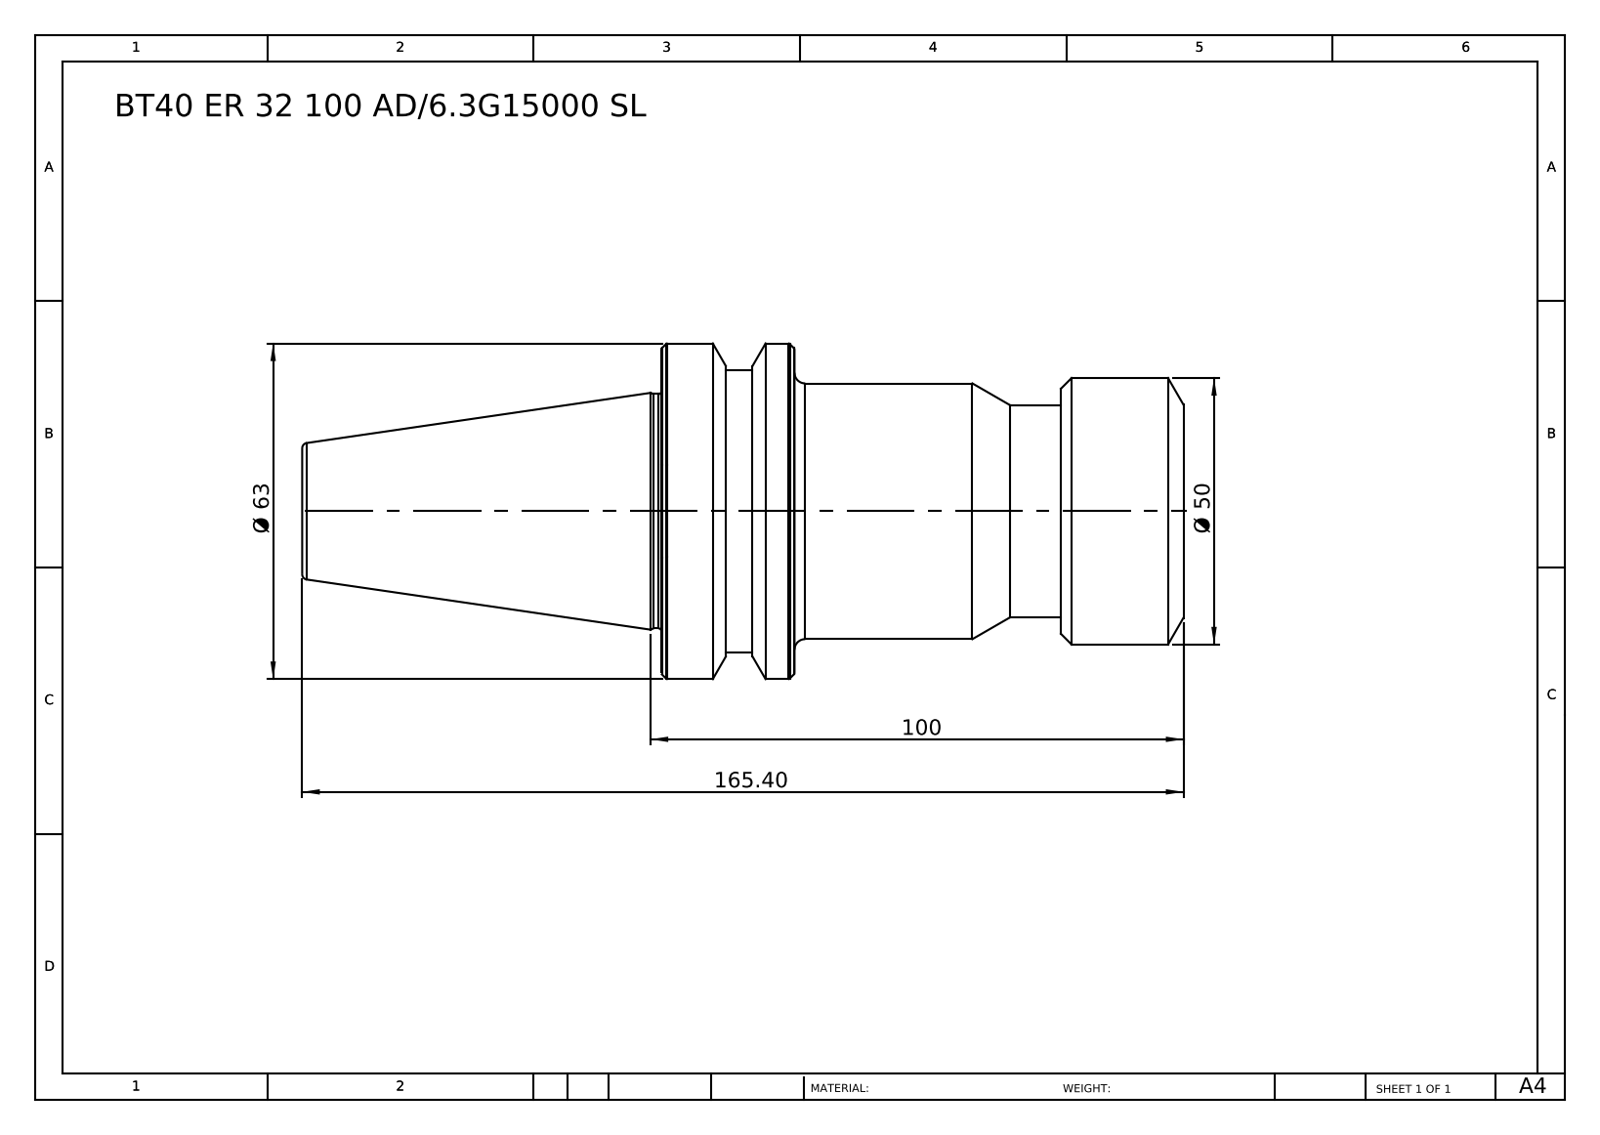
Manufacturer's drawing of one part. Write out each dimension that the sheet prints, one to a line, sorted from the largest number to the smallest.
165.40
100
Ø 63
Ø 50
